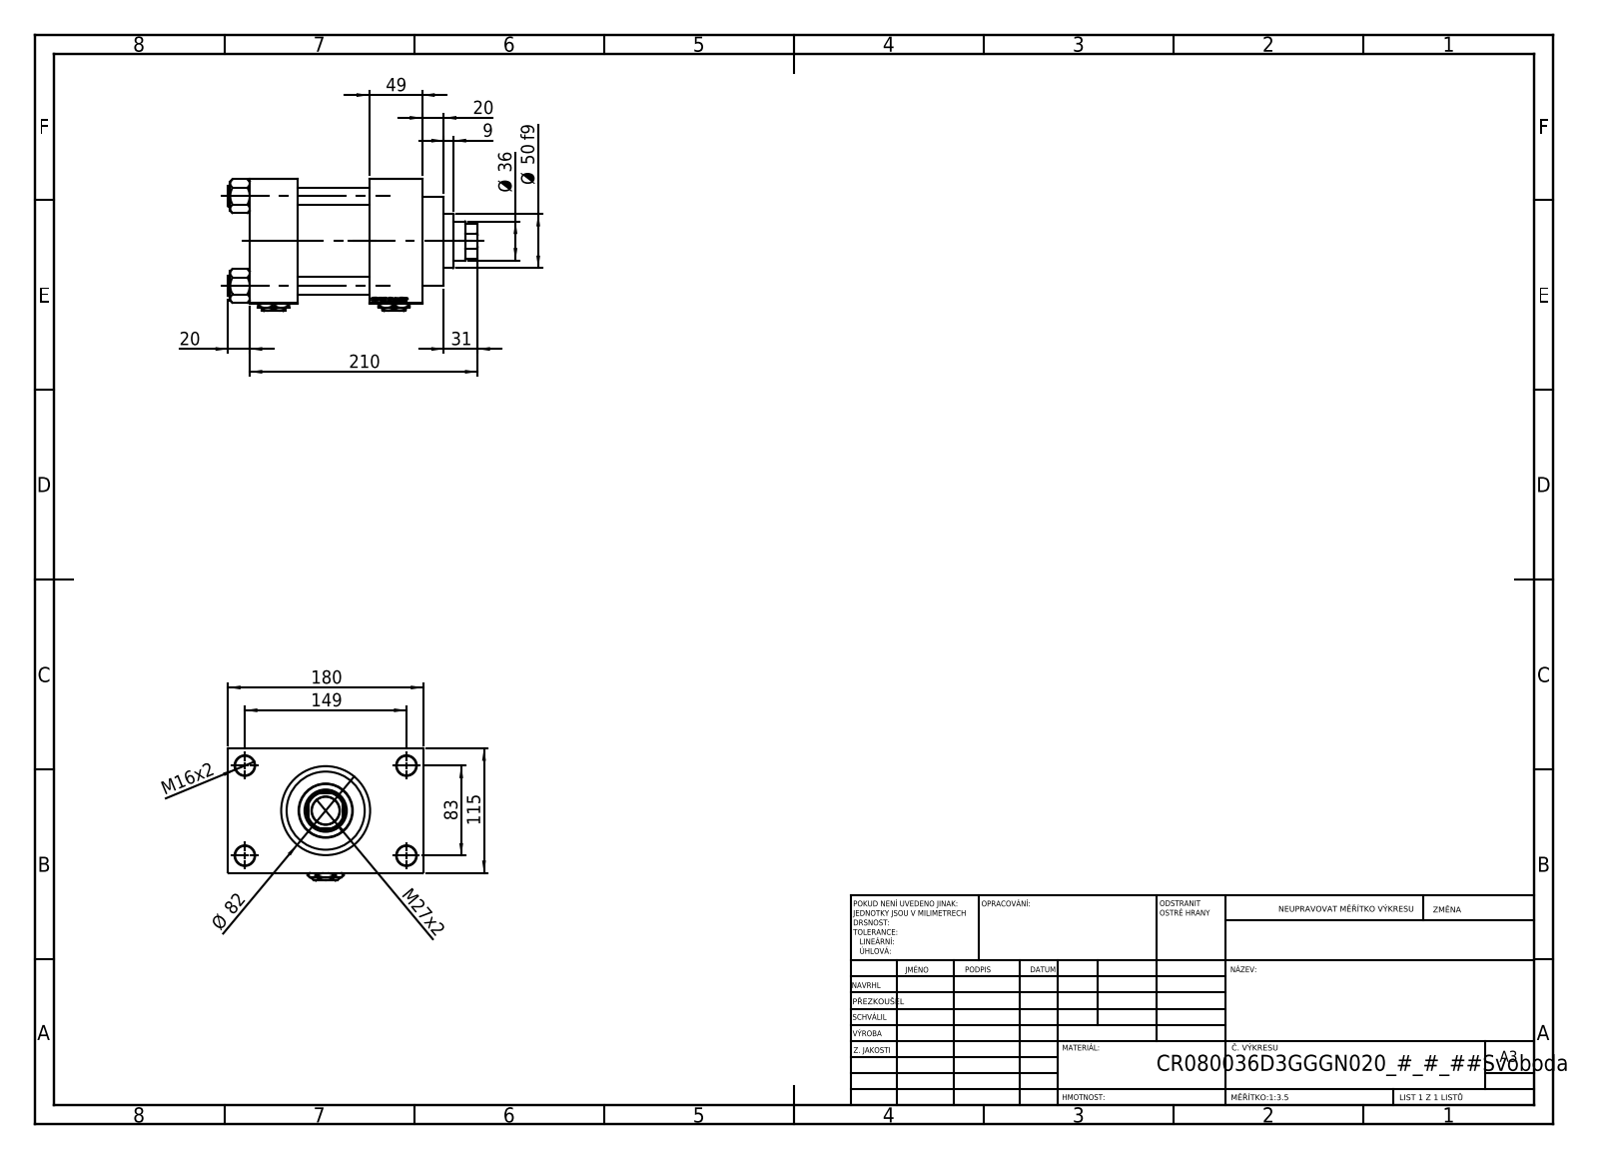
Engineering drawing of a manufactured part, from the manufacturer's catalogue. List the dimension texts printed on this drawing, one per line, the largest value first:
210
180
149
115
83
Ø 82
Ø 50 f9
49
Ø 36
31
M27x2
20
20
M16x2
9
